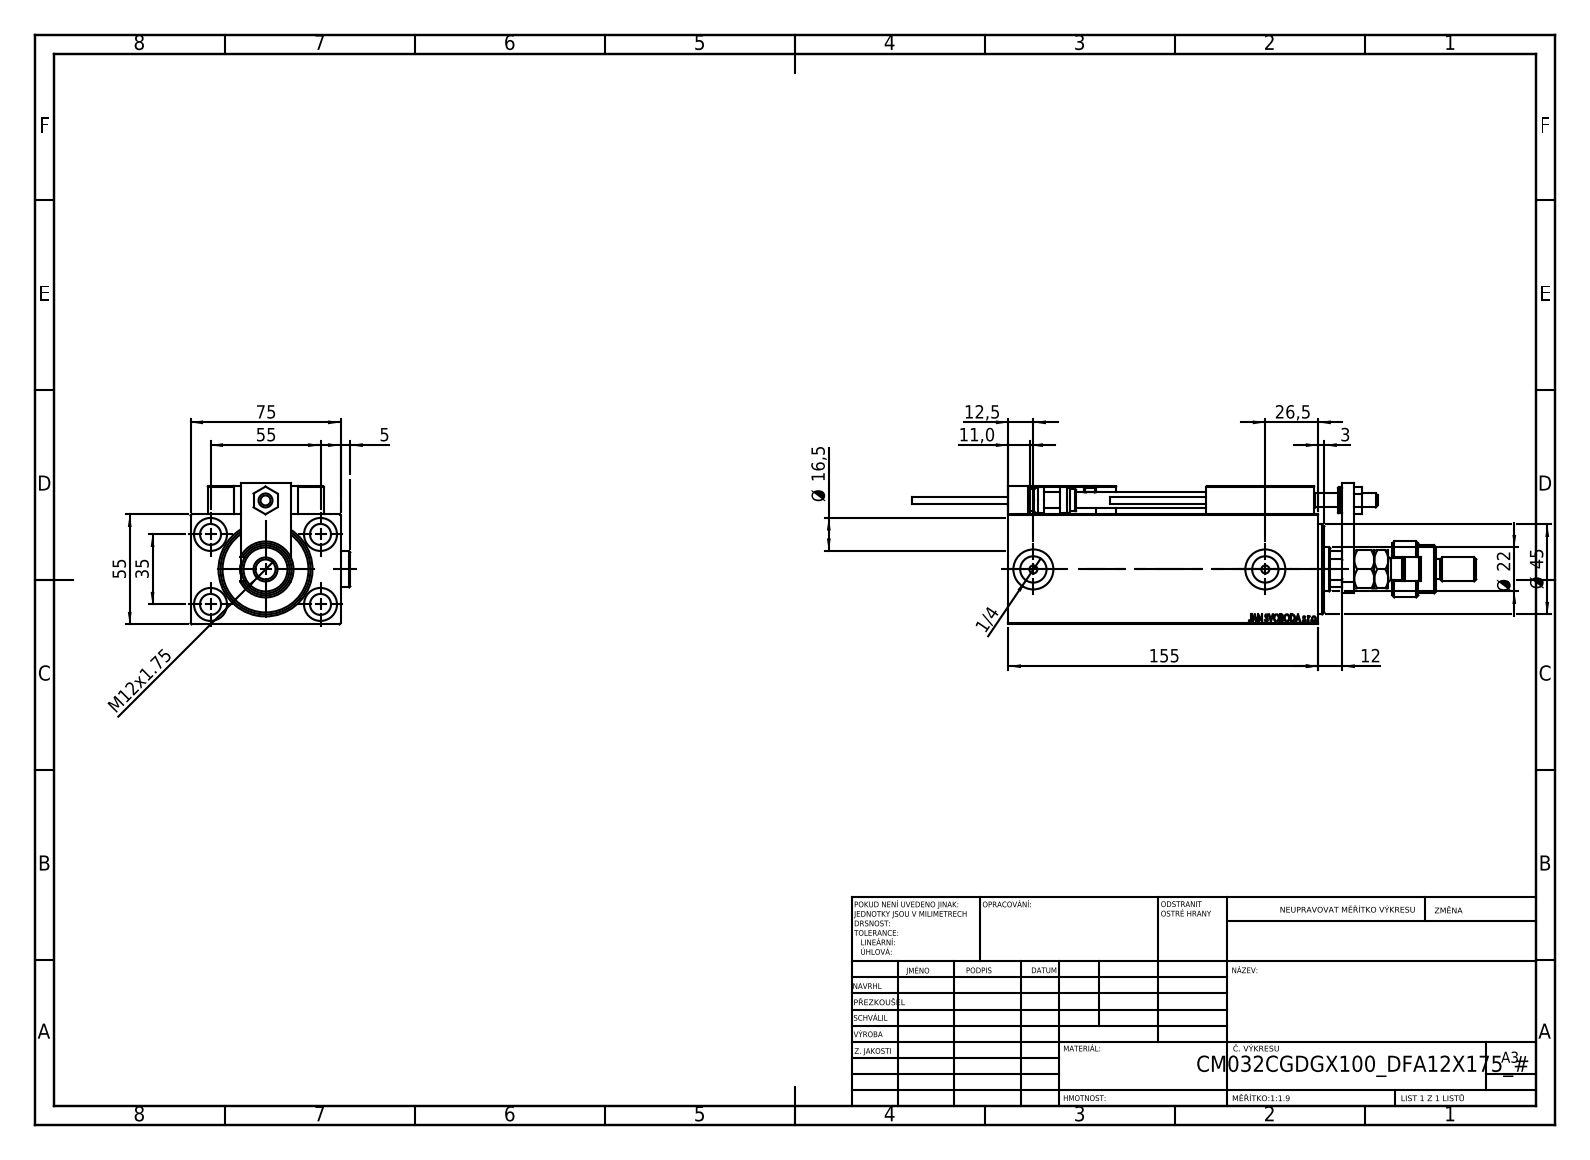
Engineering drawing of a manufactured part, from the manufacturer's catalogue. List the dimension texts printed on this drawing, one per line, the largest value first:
155
75
55
55
Ø 45
35
26,5
Ø 22
Ø 16,5
12,5
M12x1.75
12
11,0
5
3
1/4
